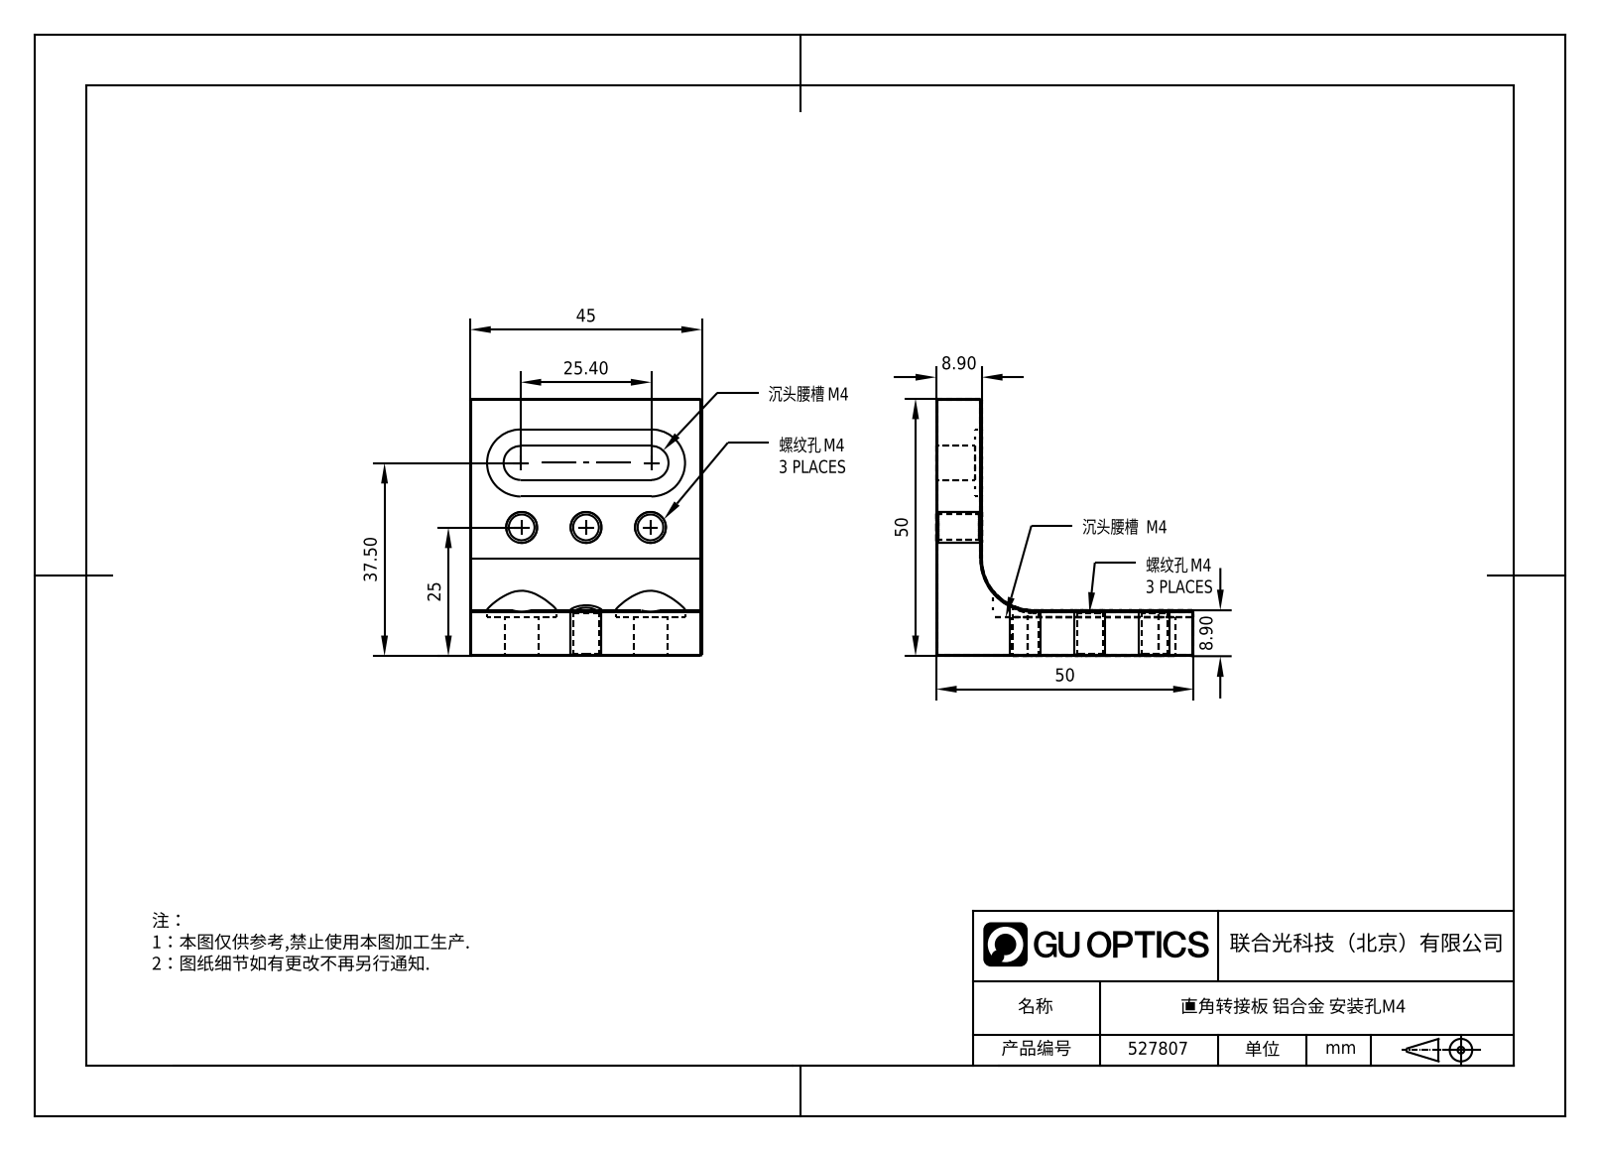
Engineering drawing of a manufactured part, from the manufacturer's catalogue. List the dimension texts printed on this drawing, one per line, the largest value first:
50
50
45
37.50
25.40
25
8.90
8.90
